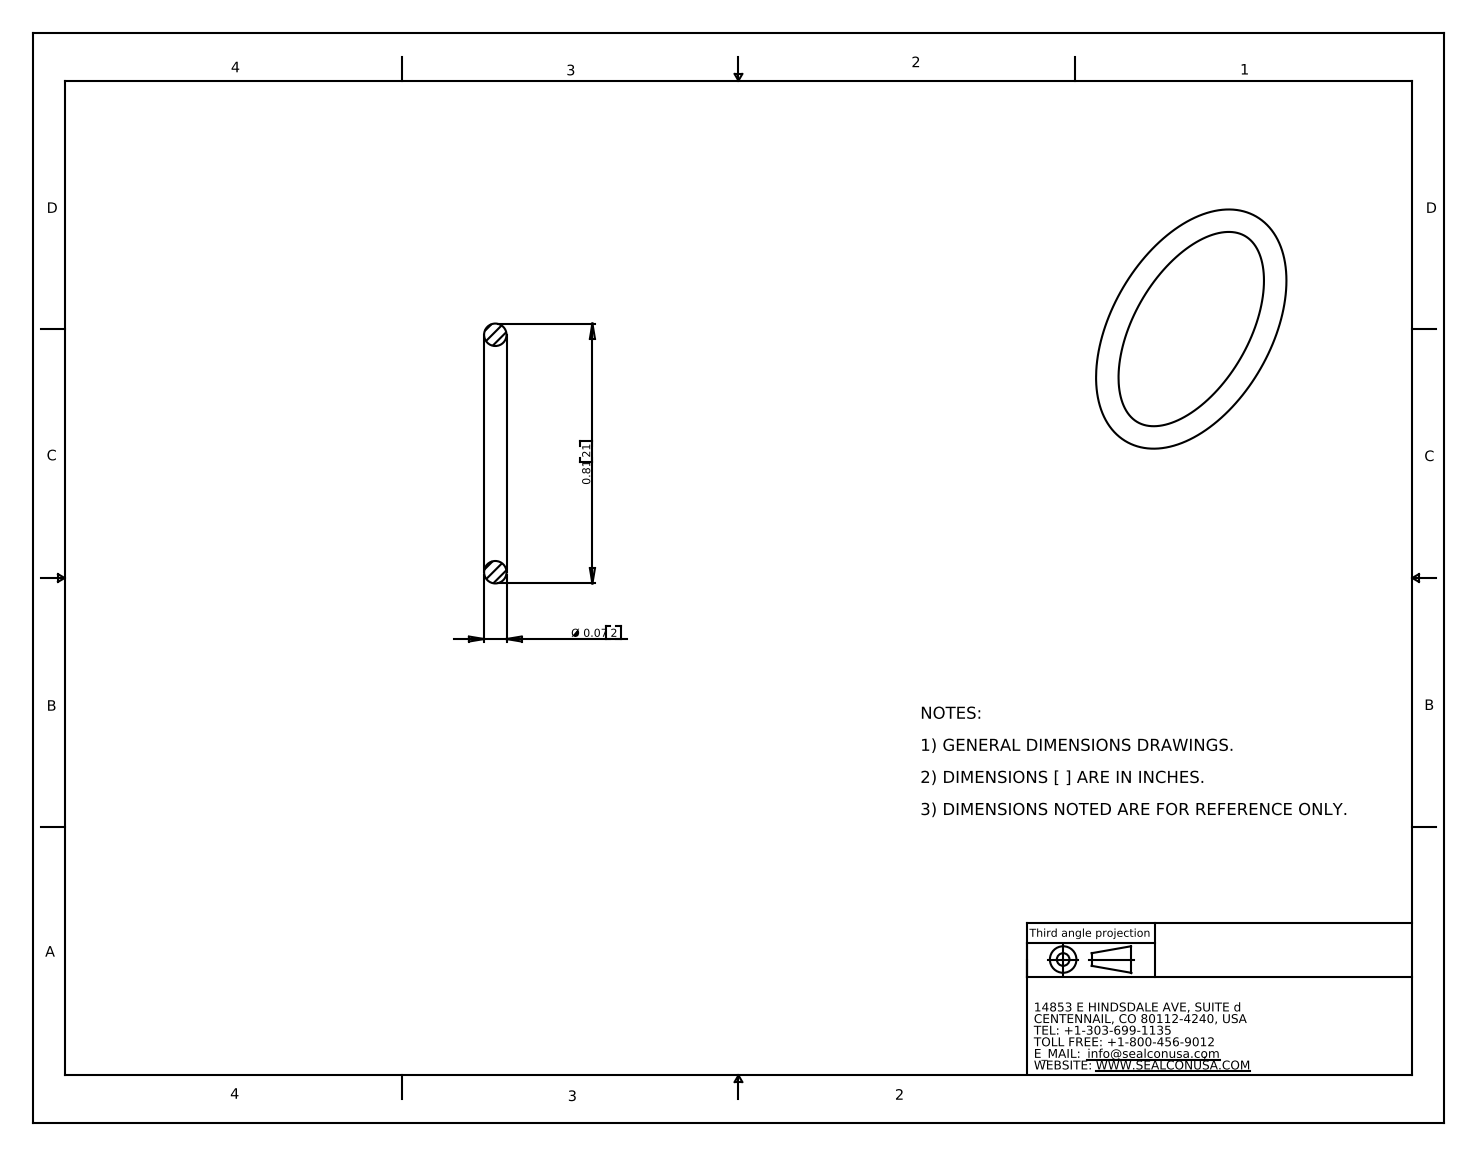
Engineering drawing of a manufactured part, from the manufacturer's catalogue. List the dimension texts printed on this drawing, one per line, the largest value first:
0.81 21
Ø 0.07 2
